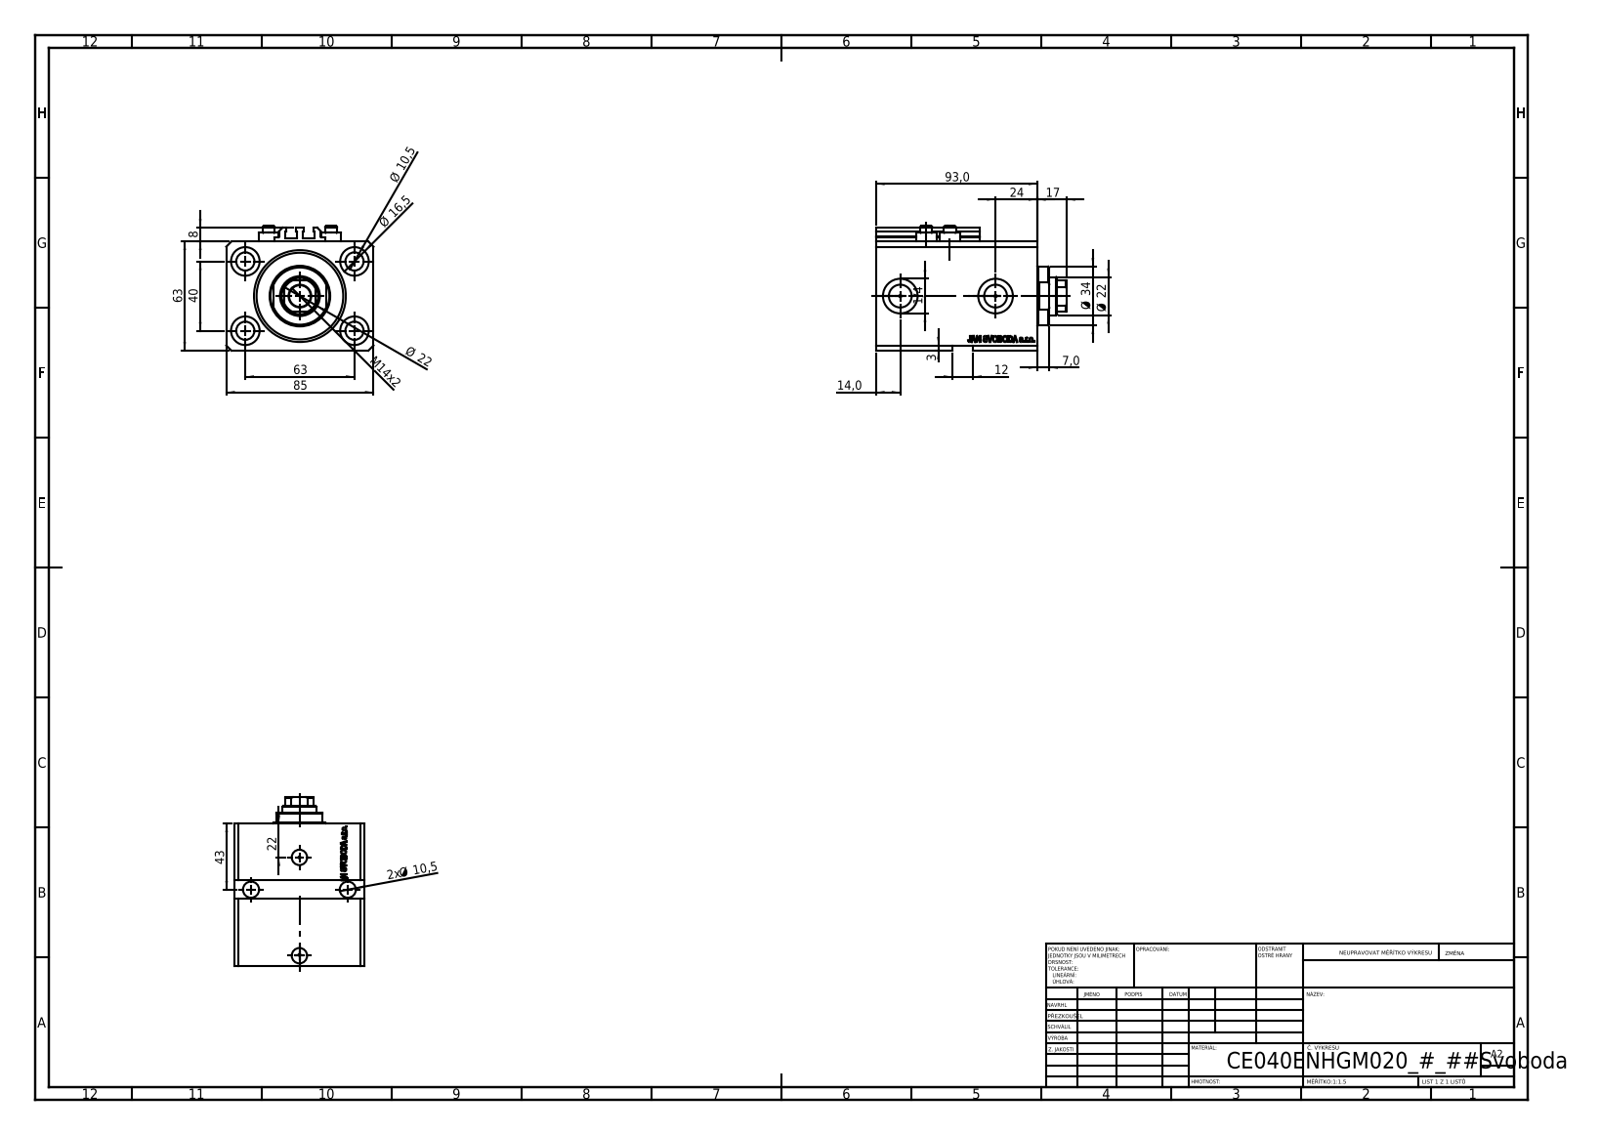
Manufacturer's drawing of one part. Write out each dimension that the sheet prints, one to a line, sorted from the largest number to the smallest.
93,0
85
63
63
43
40
Ø 34
24
Ø 22
Ø 22
22
17
Ø 16,5
M14x2
14,0
12
Ø 10,5
2x Ø 10,5
8
7,0
3
1/4
